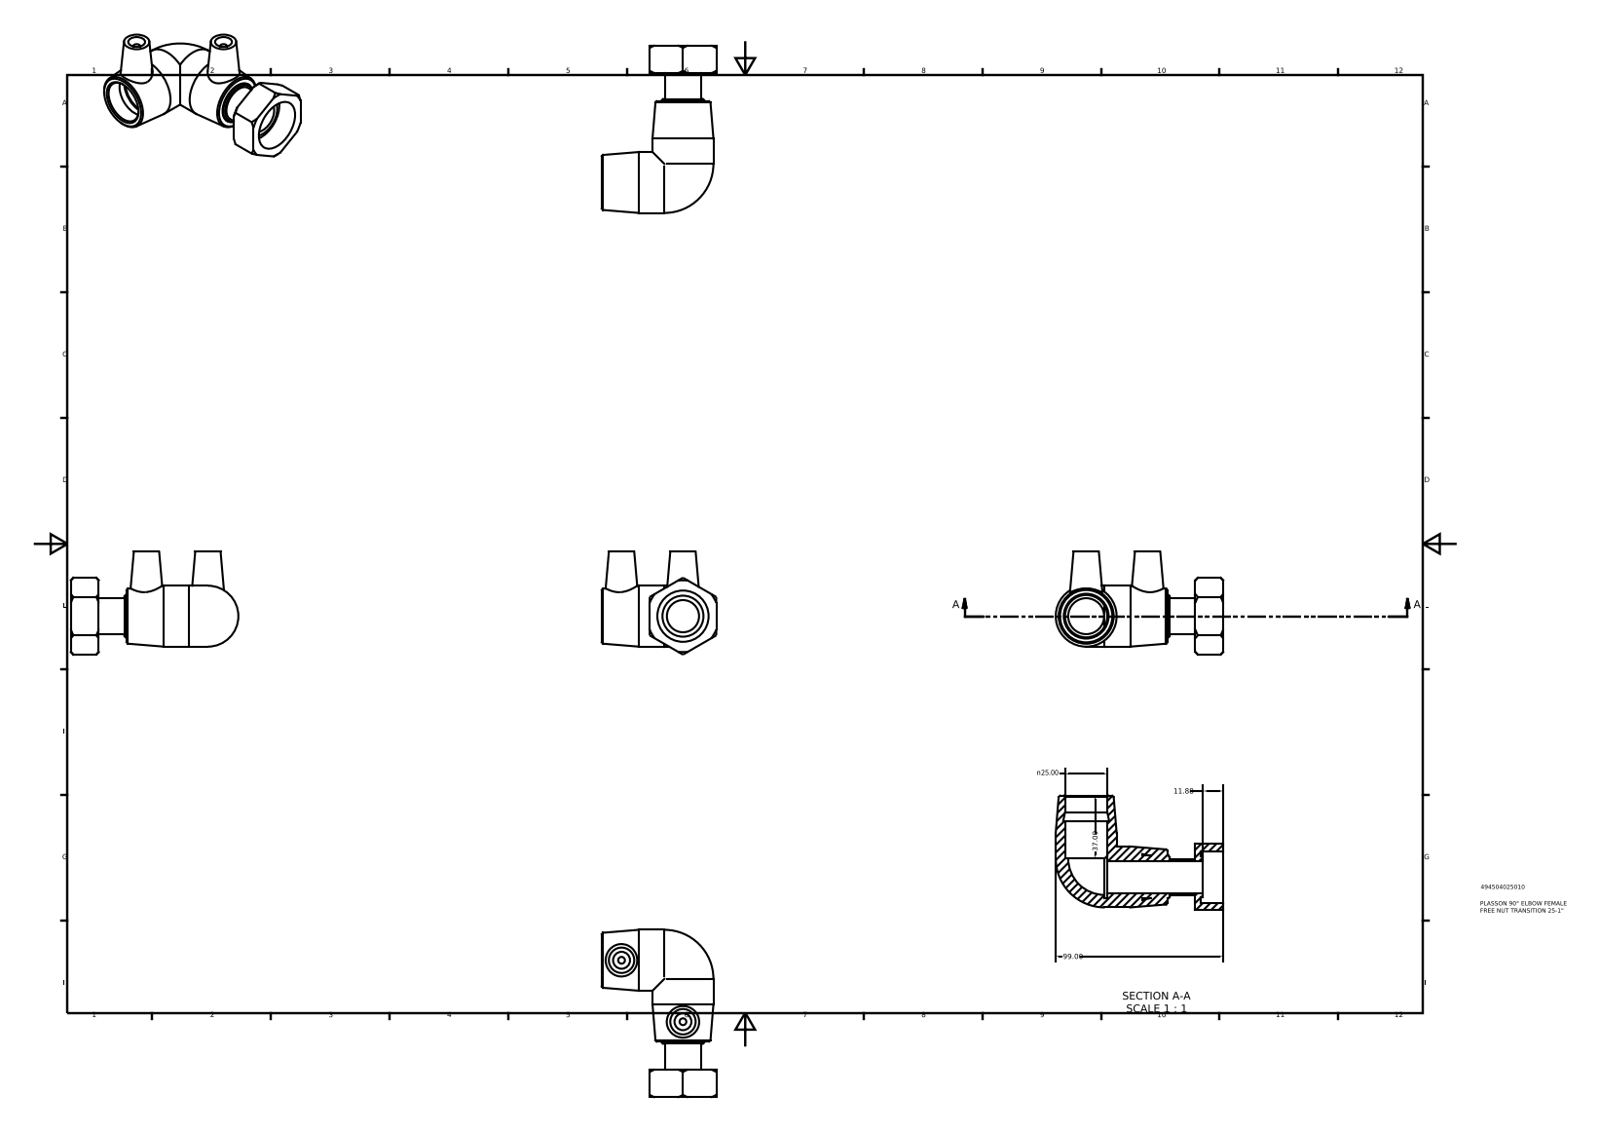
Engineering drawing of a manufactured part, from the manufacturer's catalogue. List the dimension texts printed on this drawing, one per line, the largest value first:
99.00
37.00
n25.00
11.88
